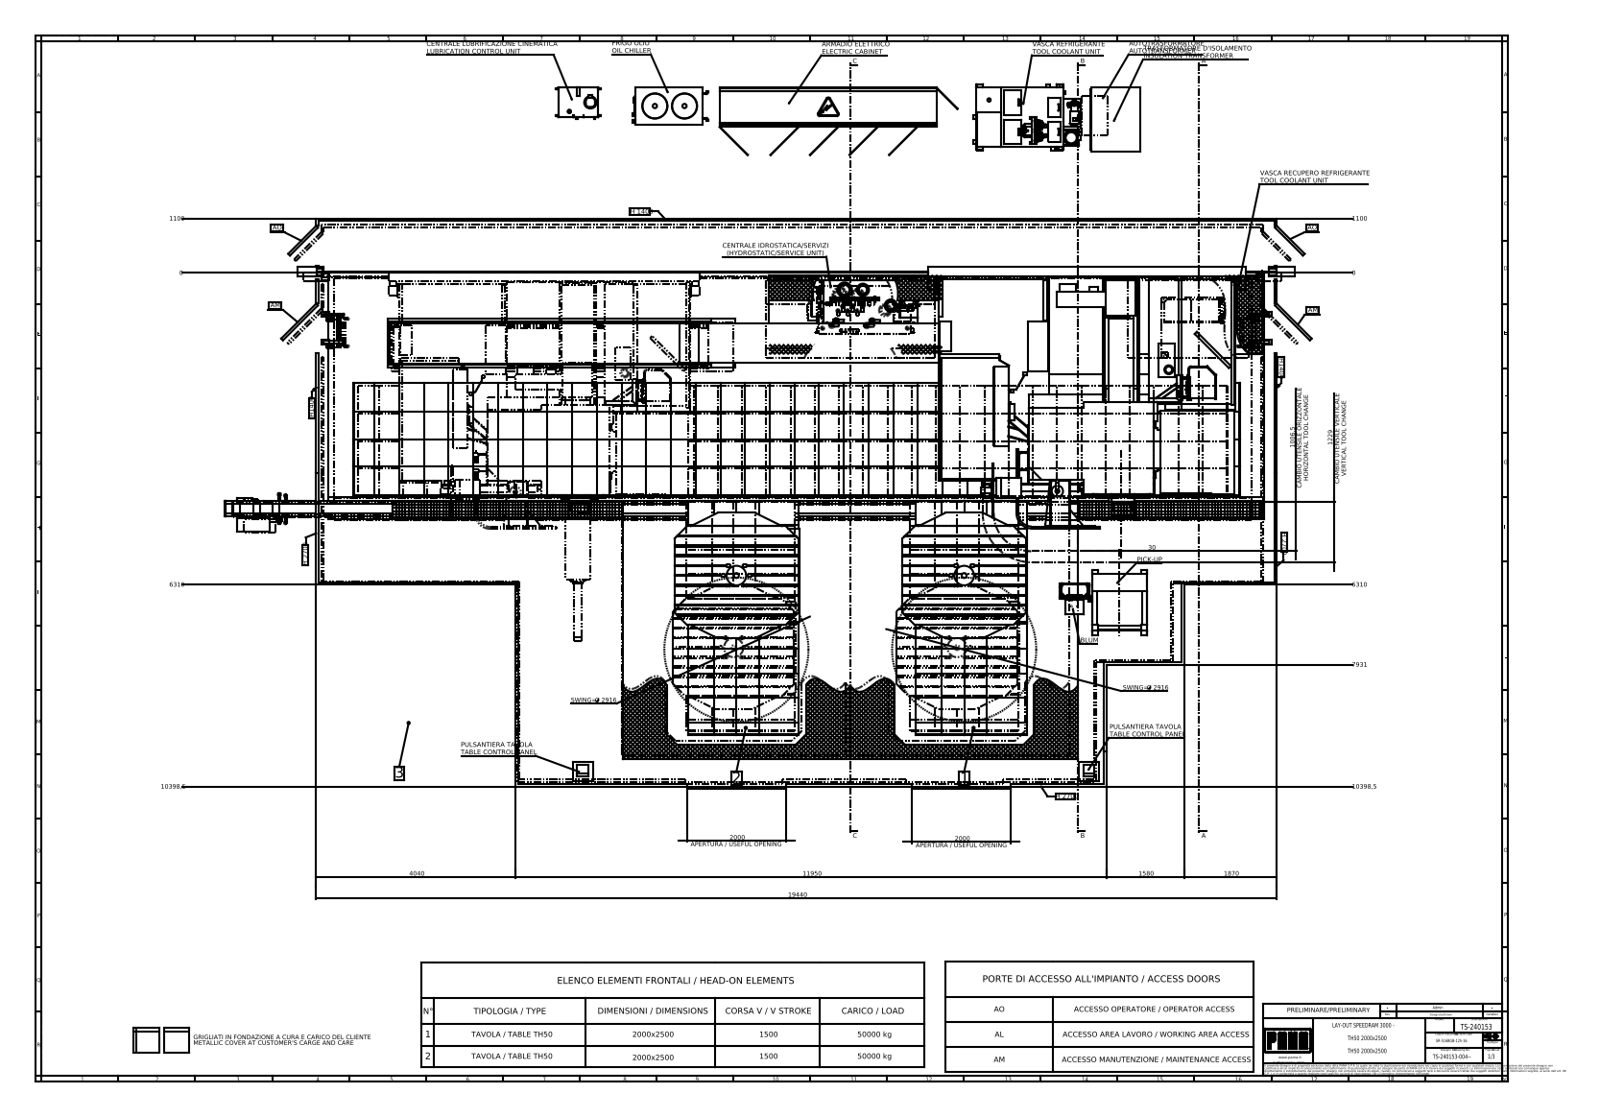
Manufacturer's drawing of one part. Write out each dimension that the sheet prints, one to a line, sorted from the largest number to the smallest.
19440
11950
10398,5
10398,5
7931
6310
6310
4040
SWING= Ø 2916
SWING= Ø 2916
2000 APERTURA / USEFUL OPENING
2000 APERTURA / USEFUL OPENING
1870
1580
1229 CAMBIO UTENSILE VERTICALE VERTICAL TOOL CHANGE
1100
1100
1006,5 CAMBIO UTENSILE ORIZZONTALE HORIZONTAL TOOL CHANGE
30
0
0
